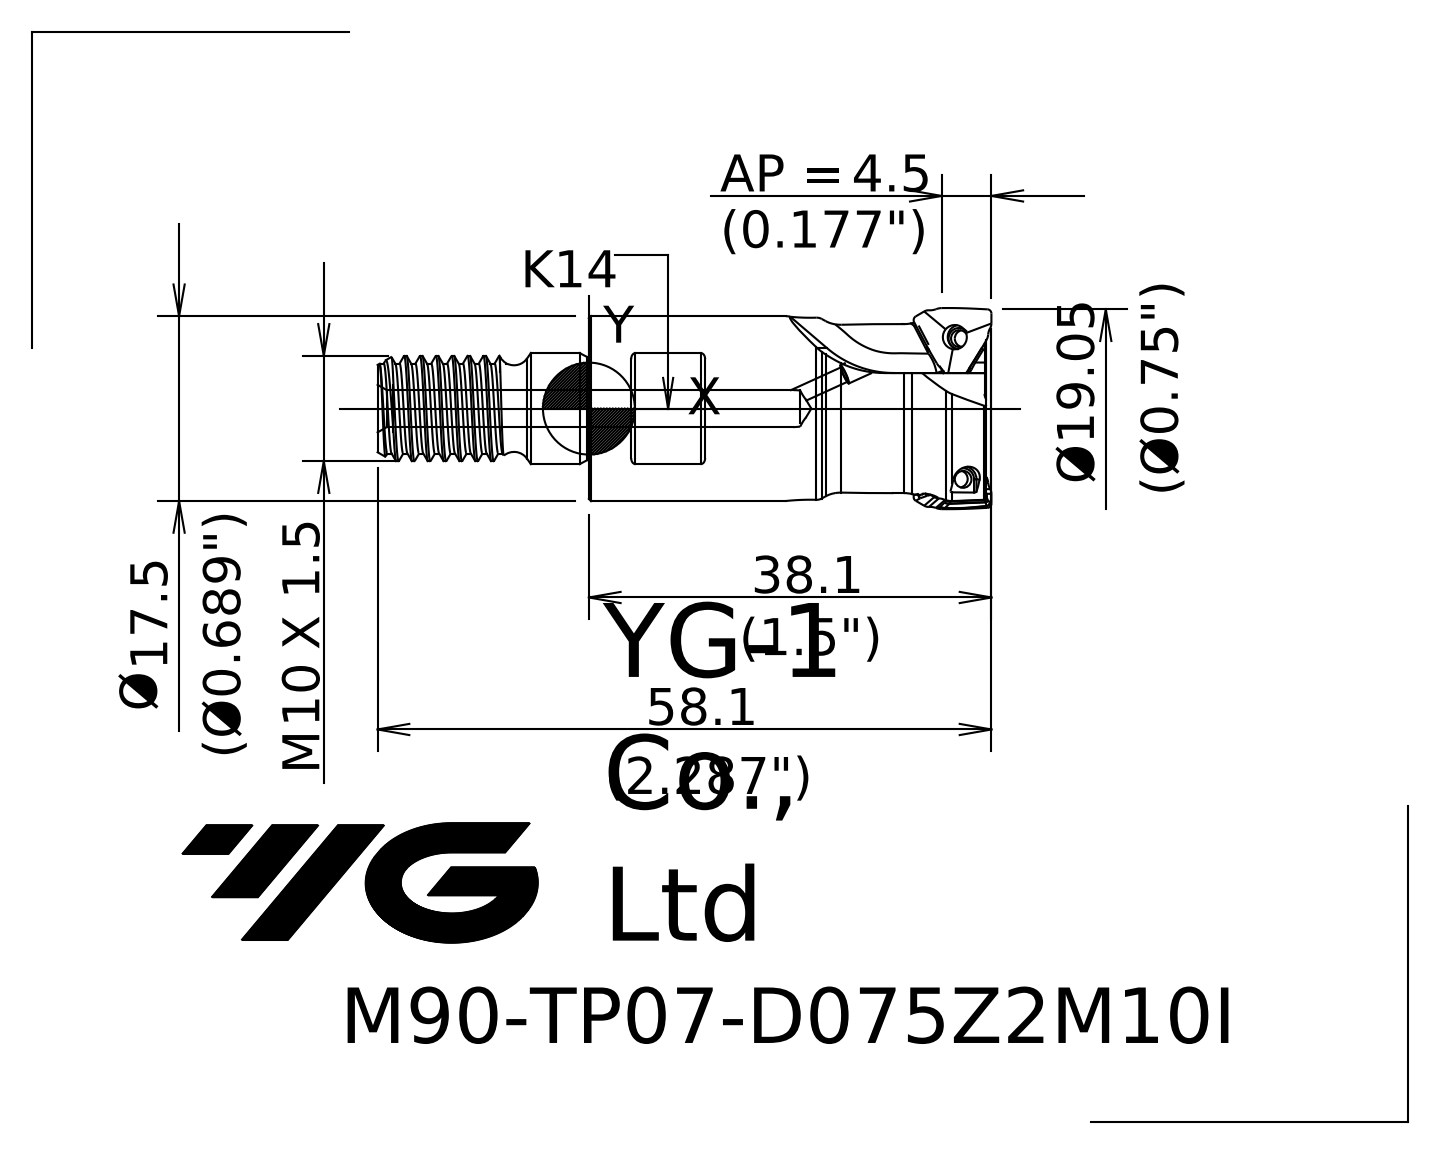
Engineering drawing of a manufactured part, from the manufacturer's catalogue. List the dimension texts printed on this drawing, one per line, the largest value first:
58.1
38.1
Ø19.05
4.5 AP =
M X 1.5 10
